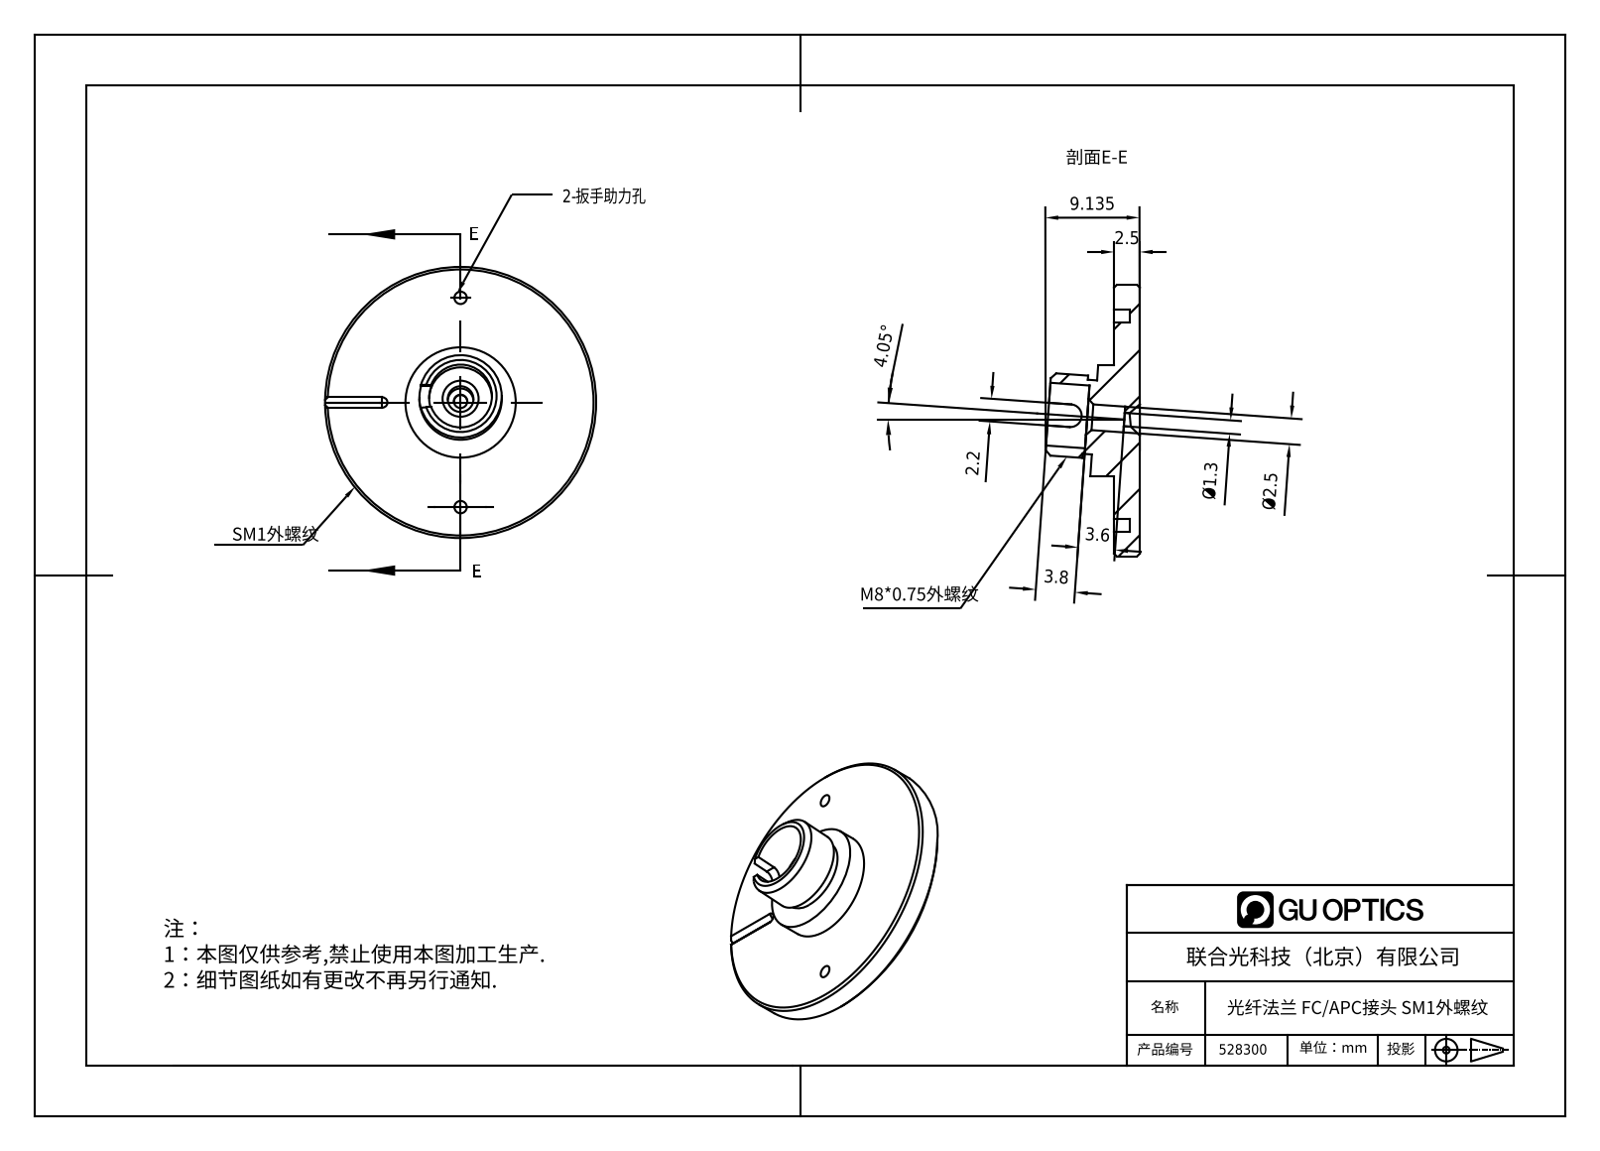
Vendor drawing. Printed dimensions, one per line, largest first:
9.135
4.05°
3.8
3.6
2.5
Ø2.5
2.2
Ø1.3
